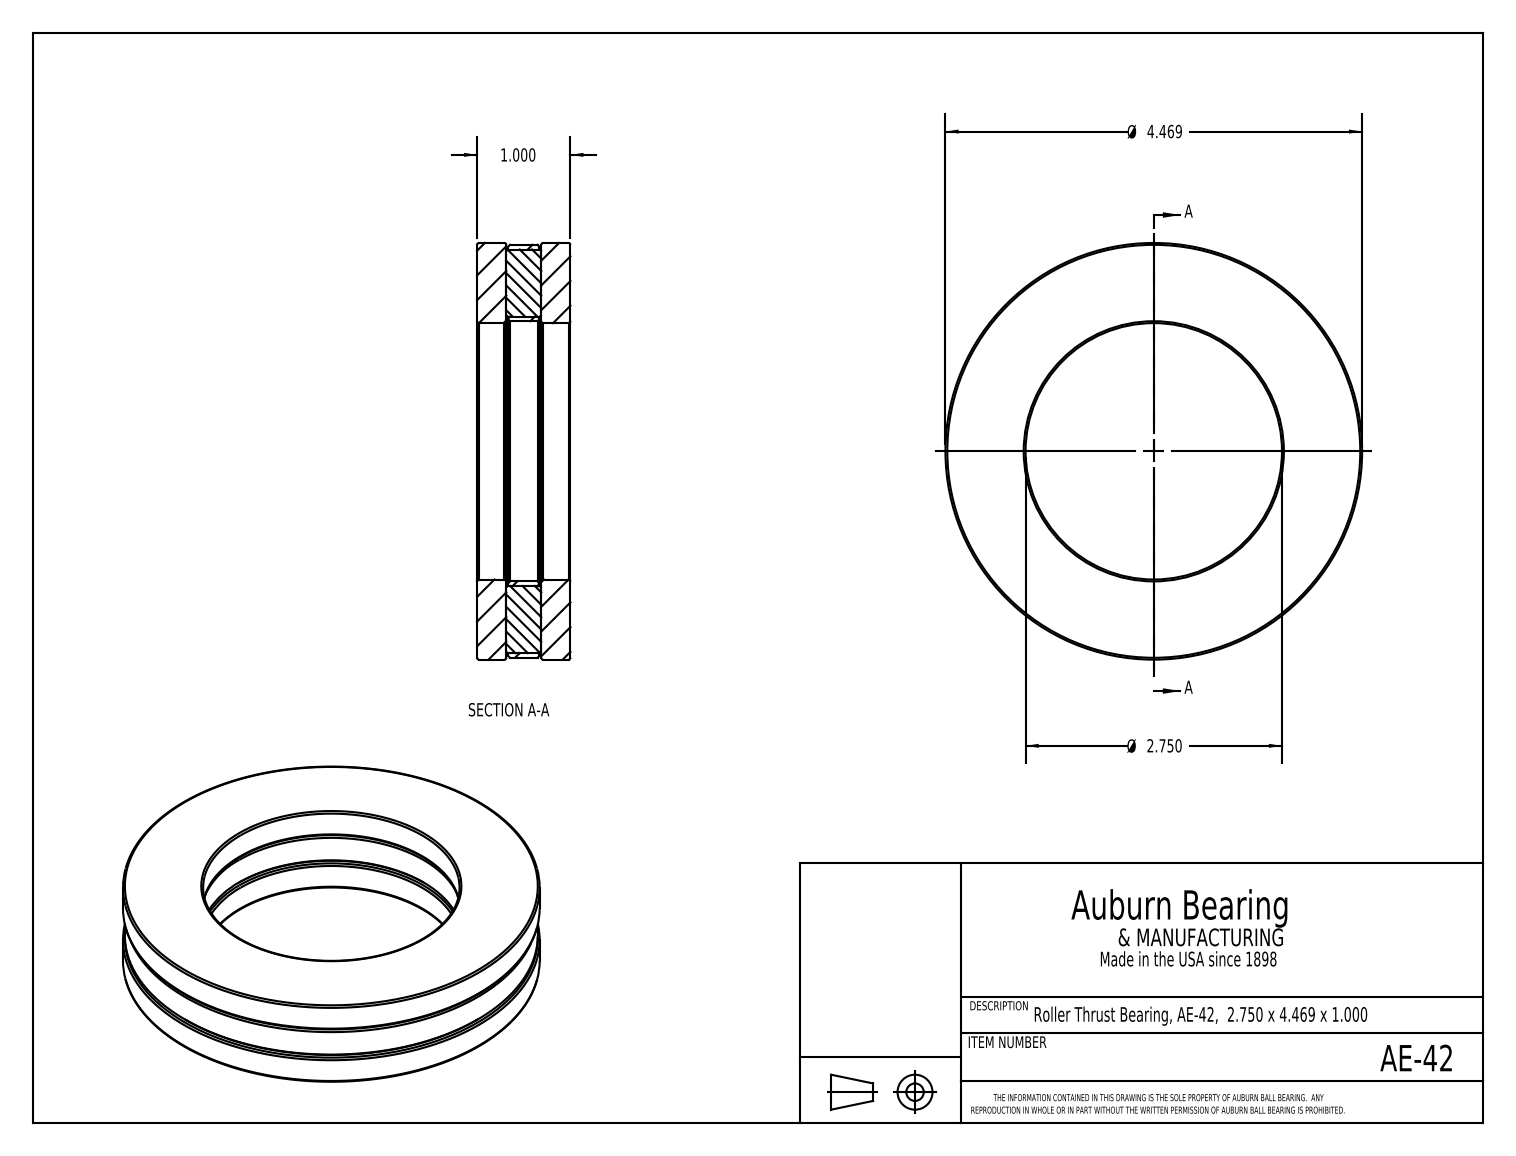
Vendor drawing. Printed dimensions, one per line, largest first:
Ø 4.469
Ø 2.750
1.000
